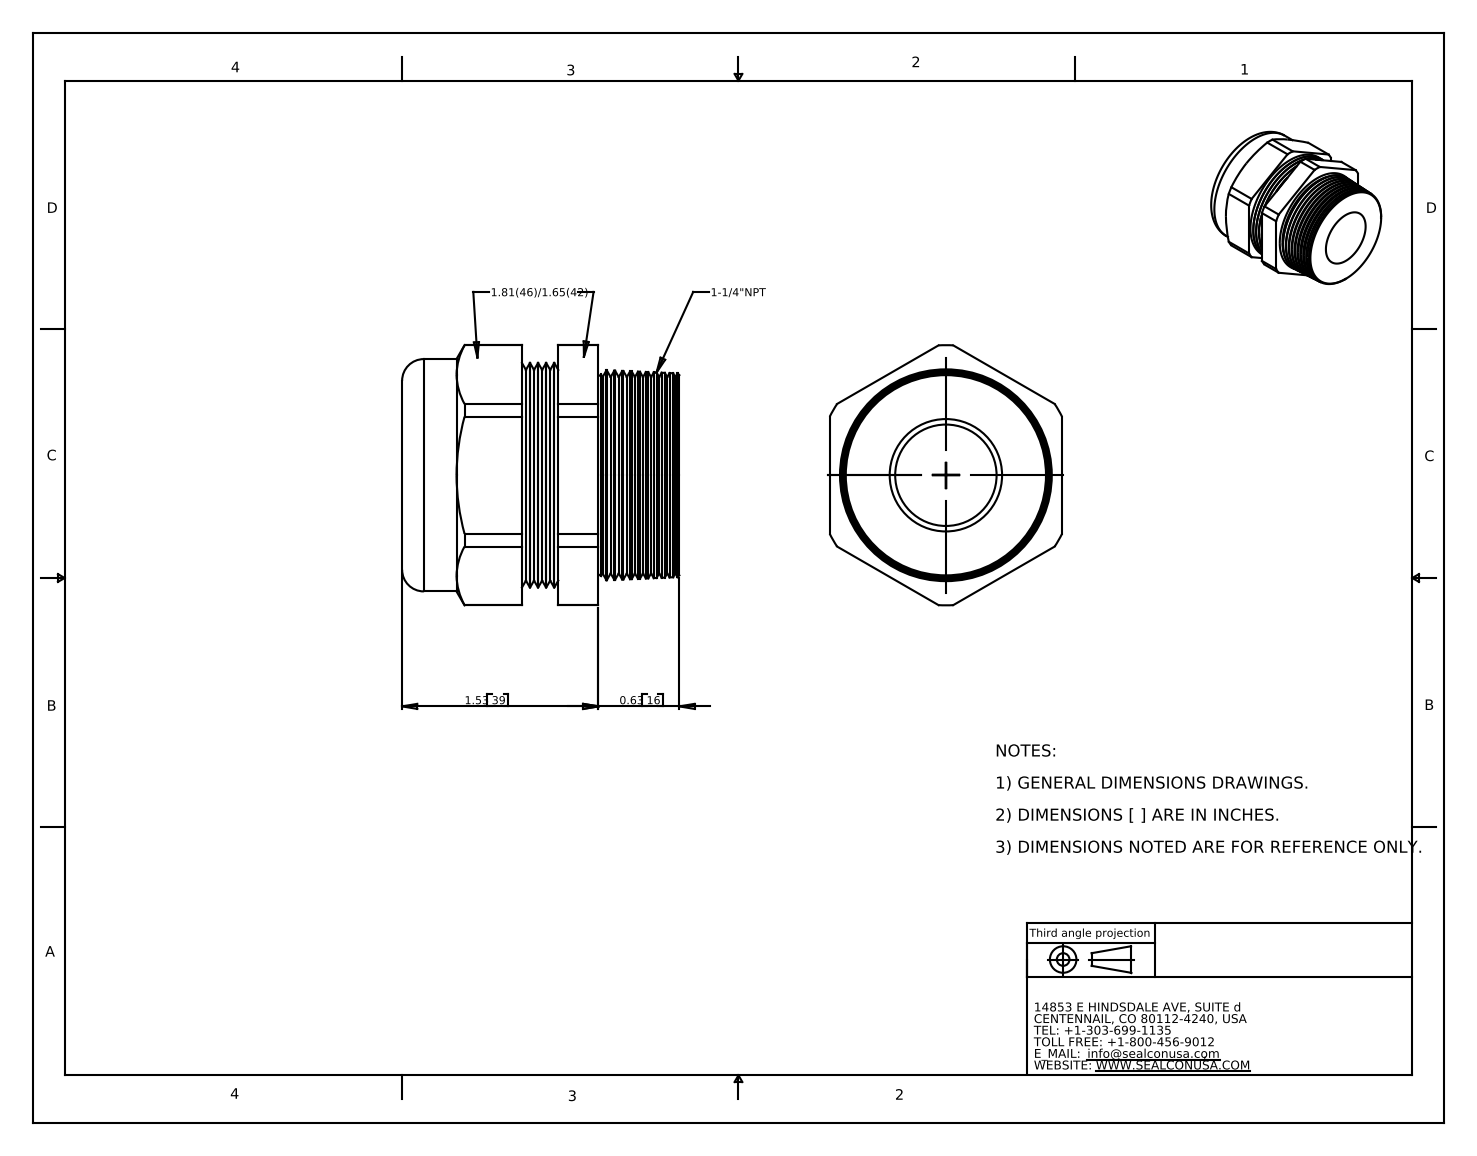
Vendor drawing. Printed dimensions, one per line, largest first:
1.53 39
0.63 16
